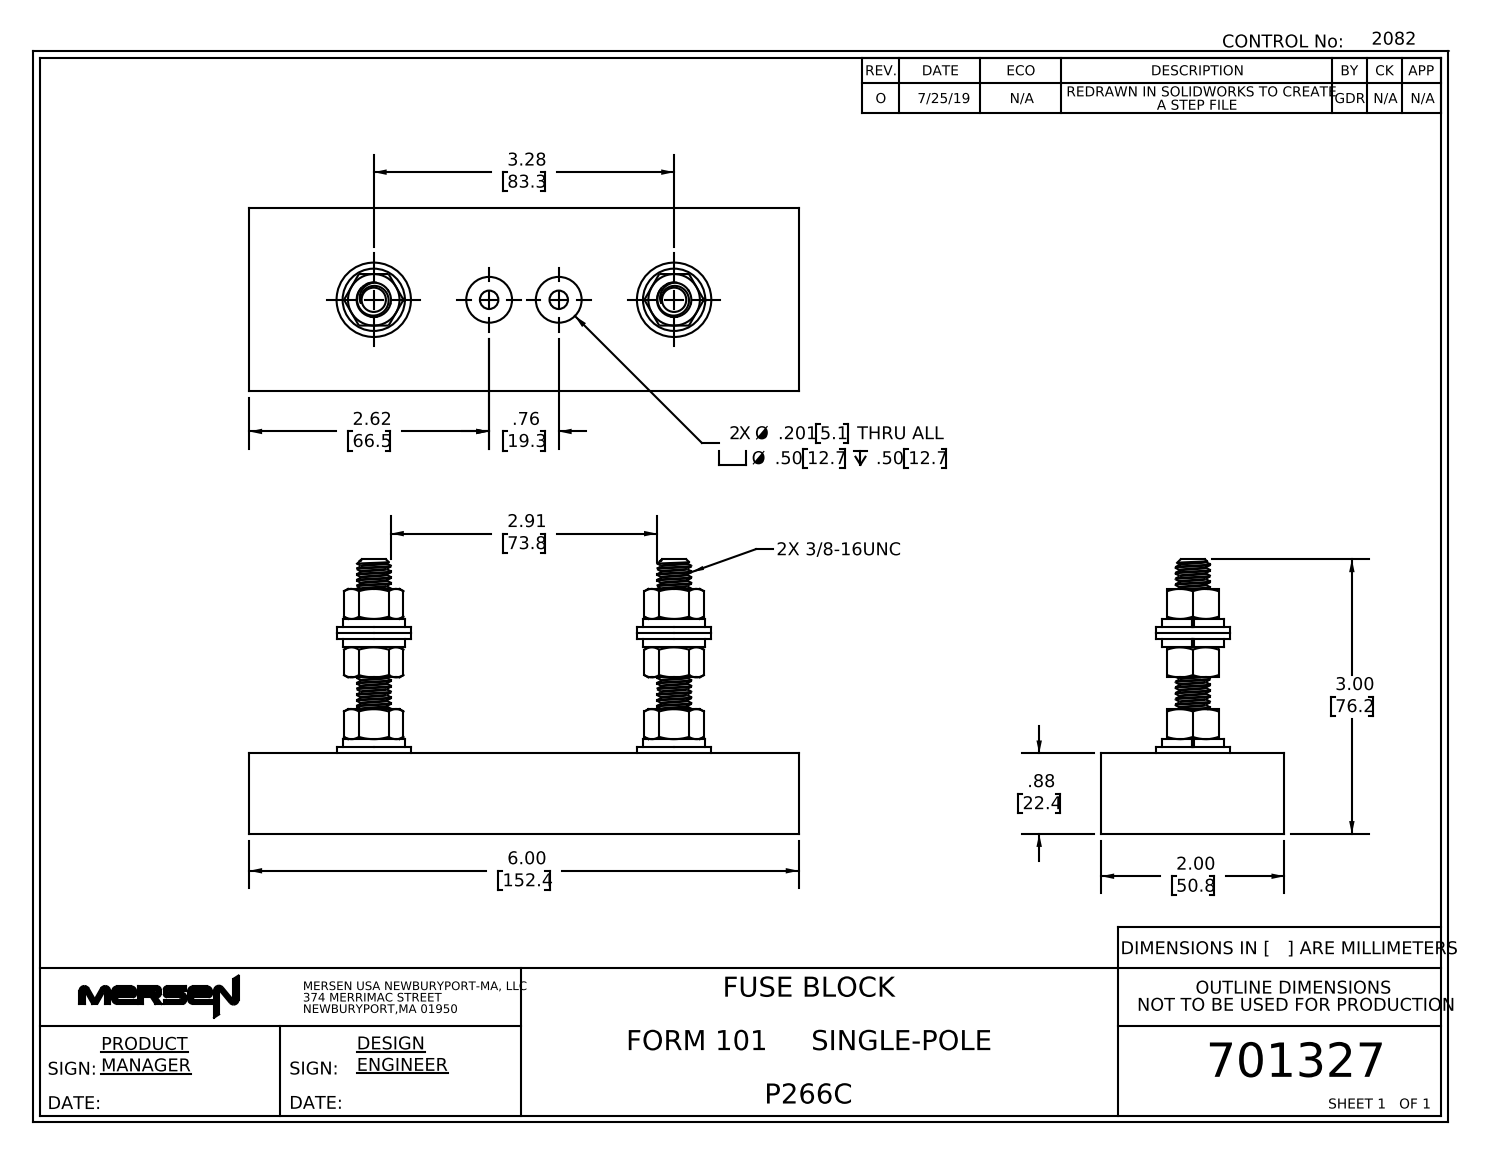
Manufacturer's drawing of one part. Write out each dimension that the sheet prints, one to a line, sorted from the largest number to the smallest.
6.00 152.4
3.28 83.3
3.00 76.2
2.91 73.8
2.62 66.5
2.00 50.8
.88 22.4
.76 19.3
2 X Ø .201 5.1 THRU ALL Ø .50 12.7 .50 12.7
